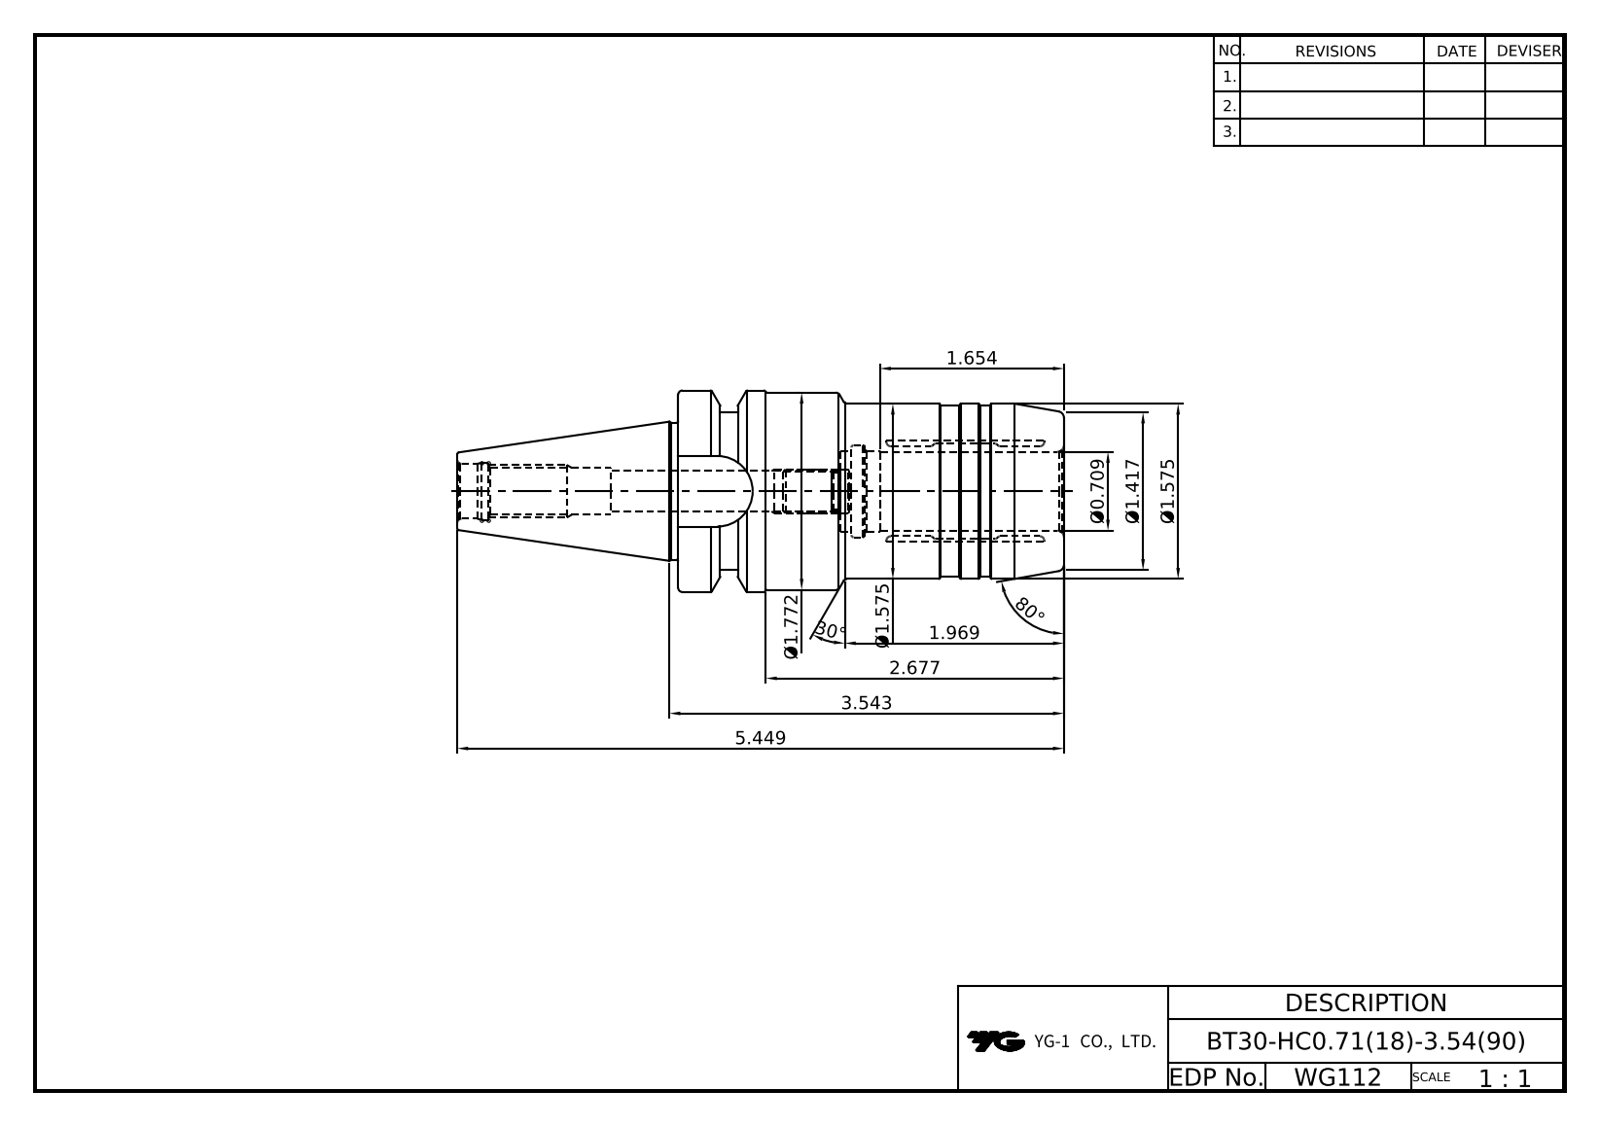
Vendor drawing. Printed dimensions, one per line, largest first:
80°
30°
5.449
3.543
2.677
1.969
Ø1.772
1.654
Ø1.575
Ø1.575
Ø1.417
Ø0.709
